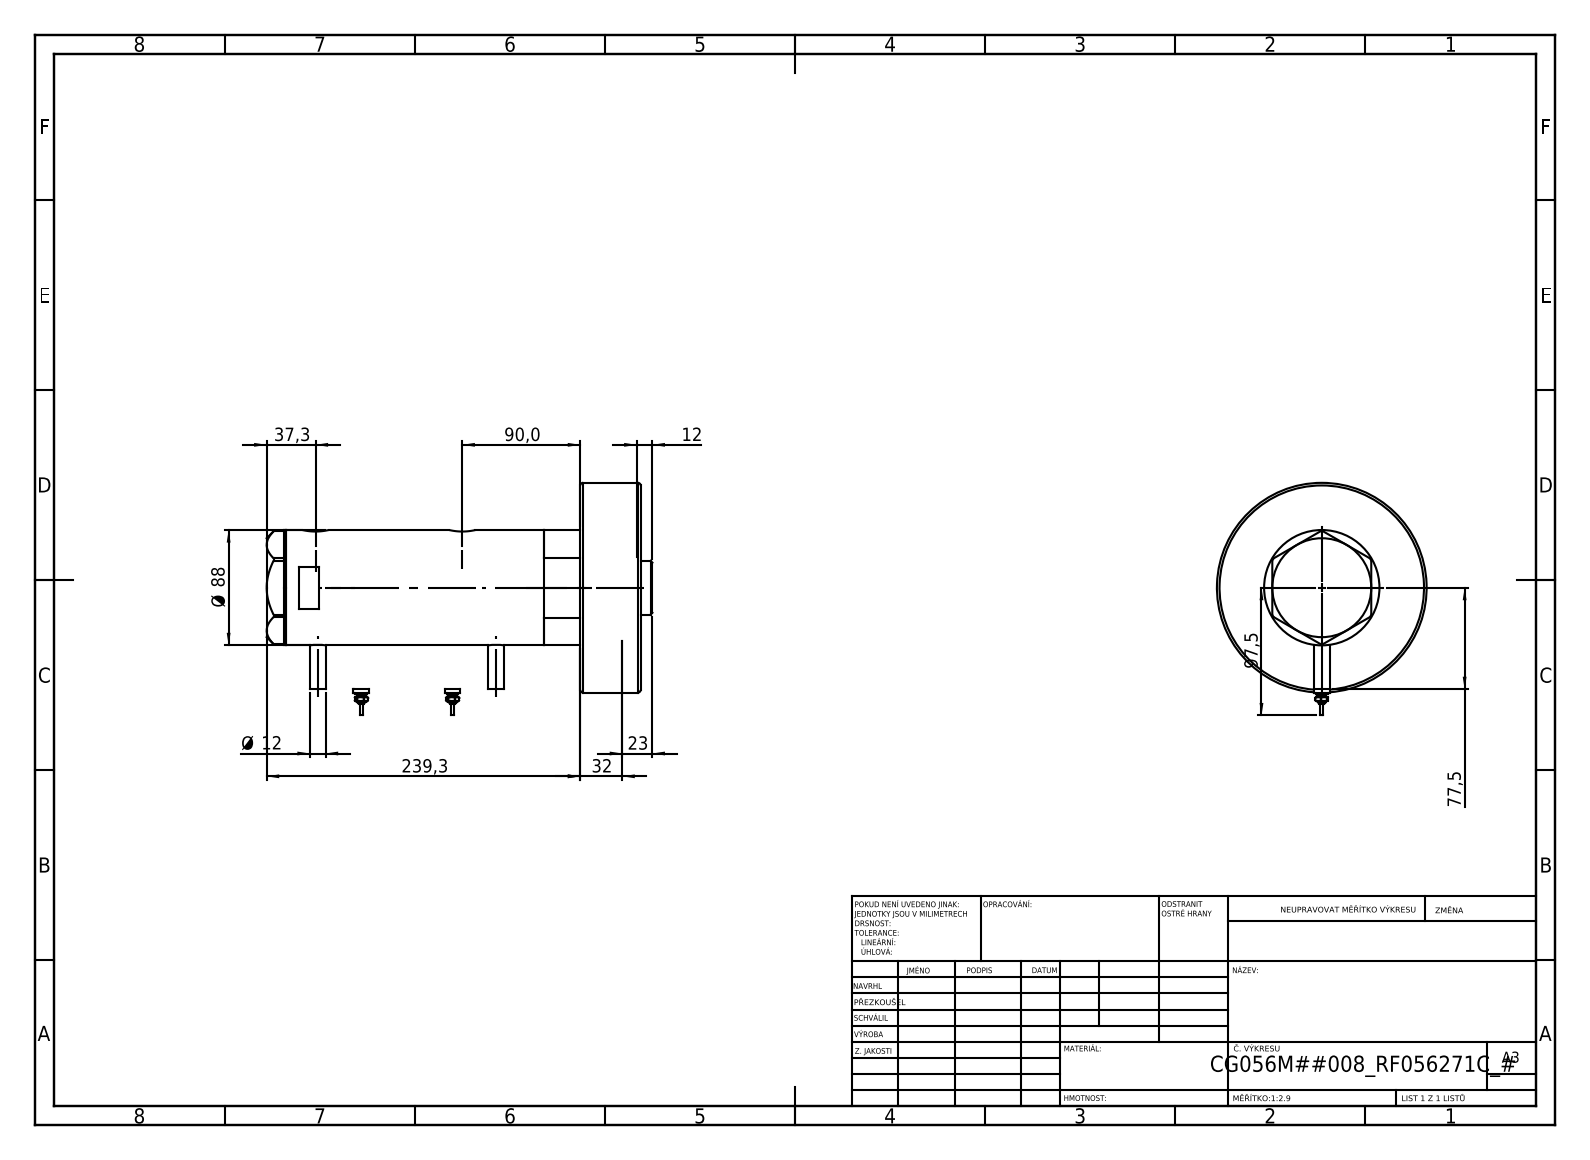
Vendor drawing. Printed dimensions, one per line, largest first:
239,3
97,5
90,0
Ø 88
77,5
37,3
32
23
12
Ø 12
